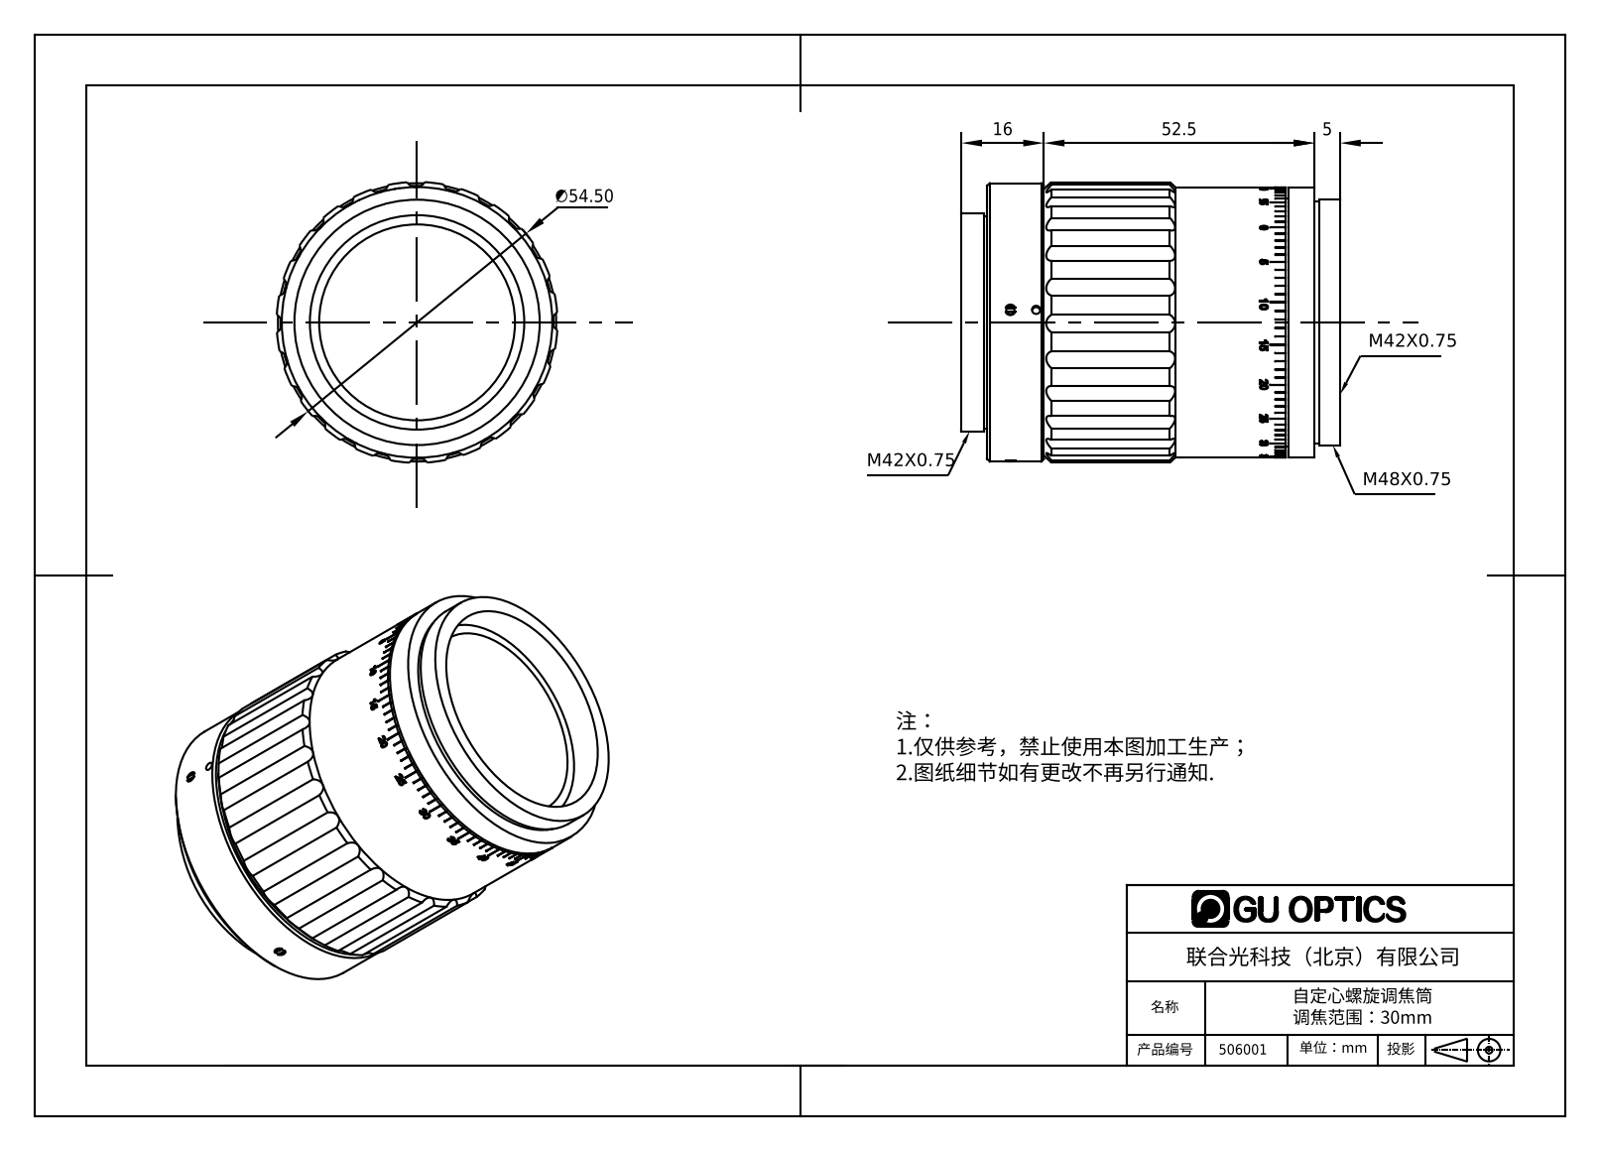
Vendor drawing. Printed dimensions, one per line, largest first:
∅54.50
52.5
16
5
